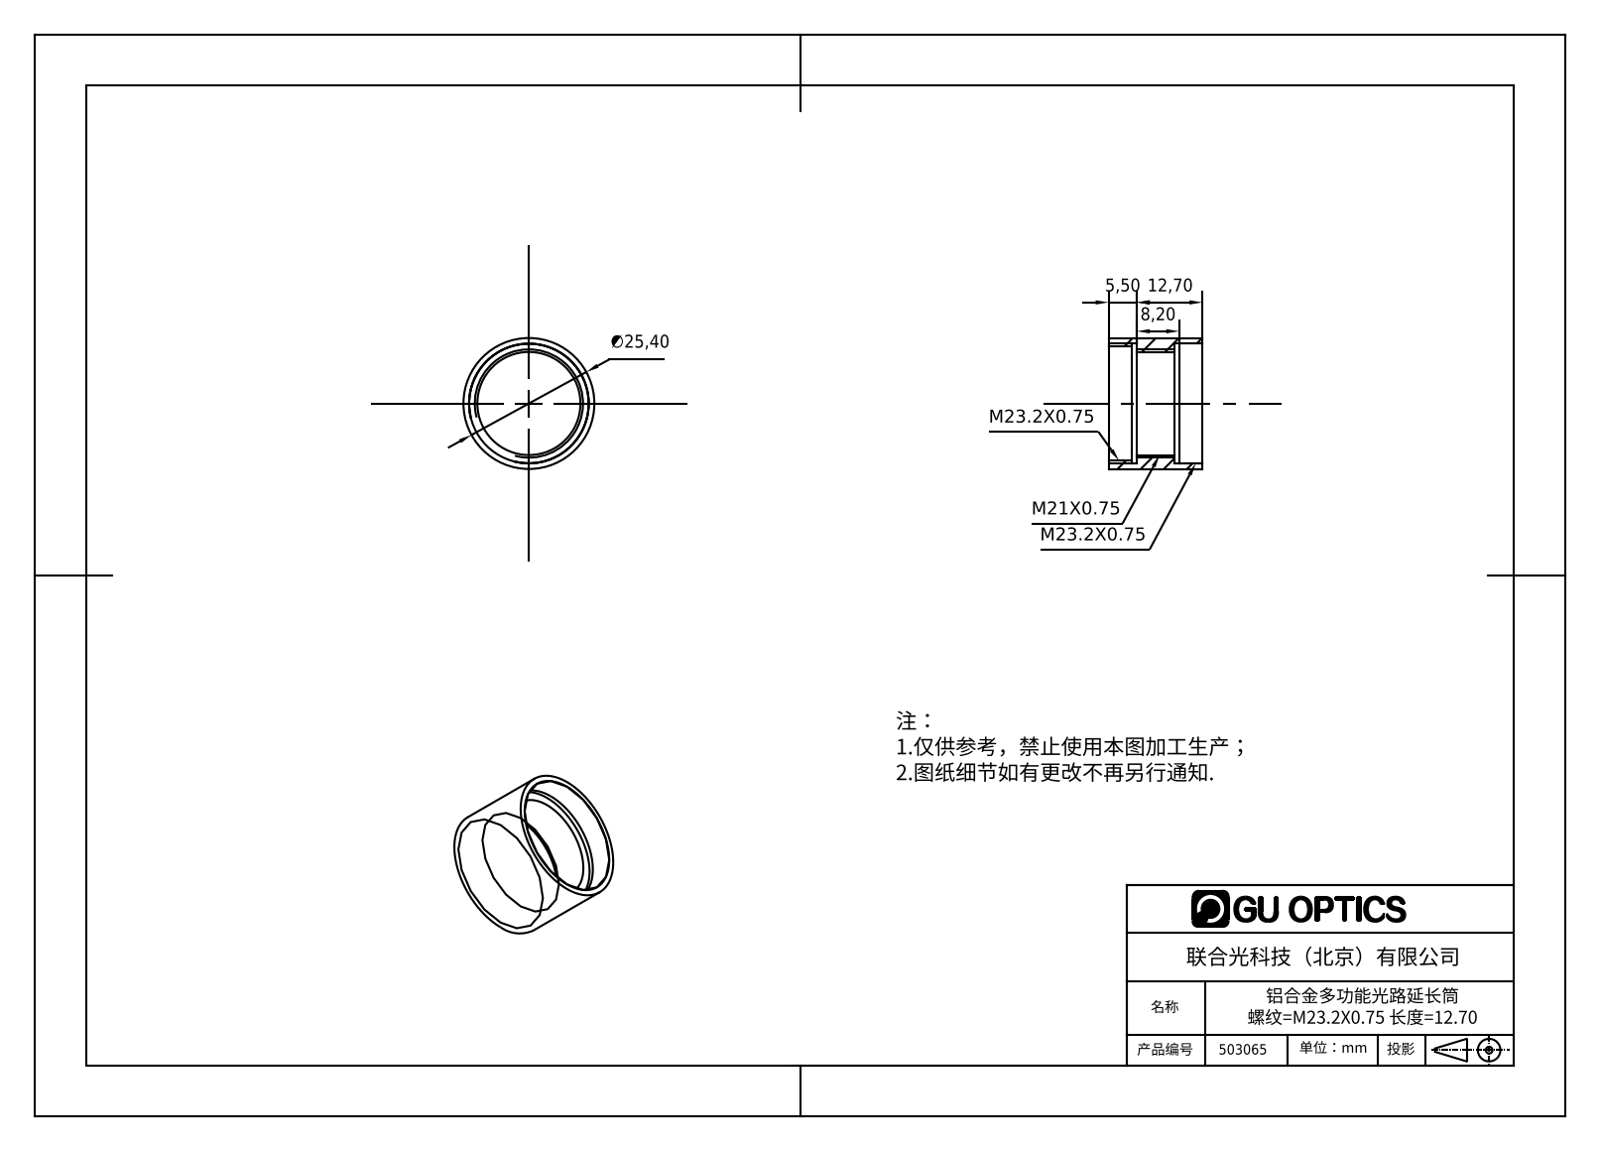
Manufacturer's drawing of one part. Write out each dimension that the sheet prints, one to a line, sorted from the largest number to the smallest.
∅25,40
12,70
8,20
5,50
